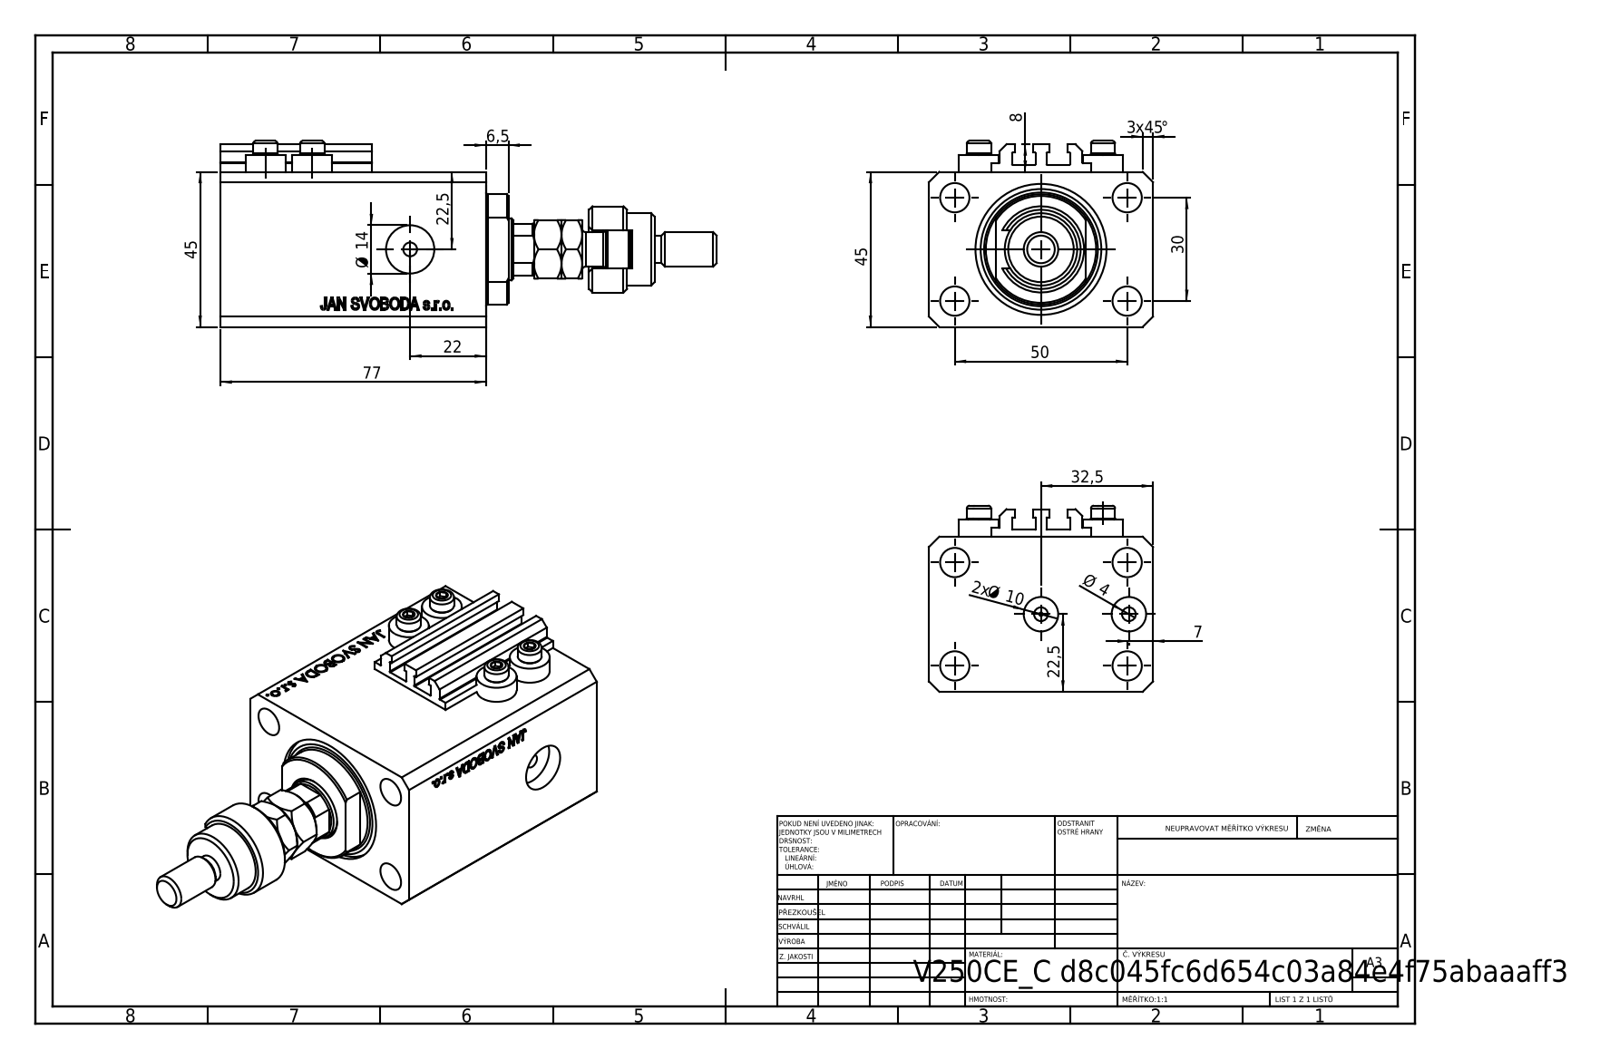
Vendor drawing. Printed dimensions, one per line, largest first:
77
50
45
3 x45 °
45
32,5
30
22,5
22,5
22
Ø 14
2x Ø 10
8
7
6,5
Ø 4
